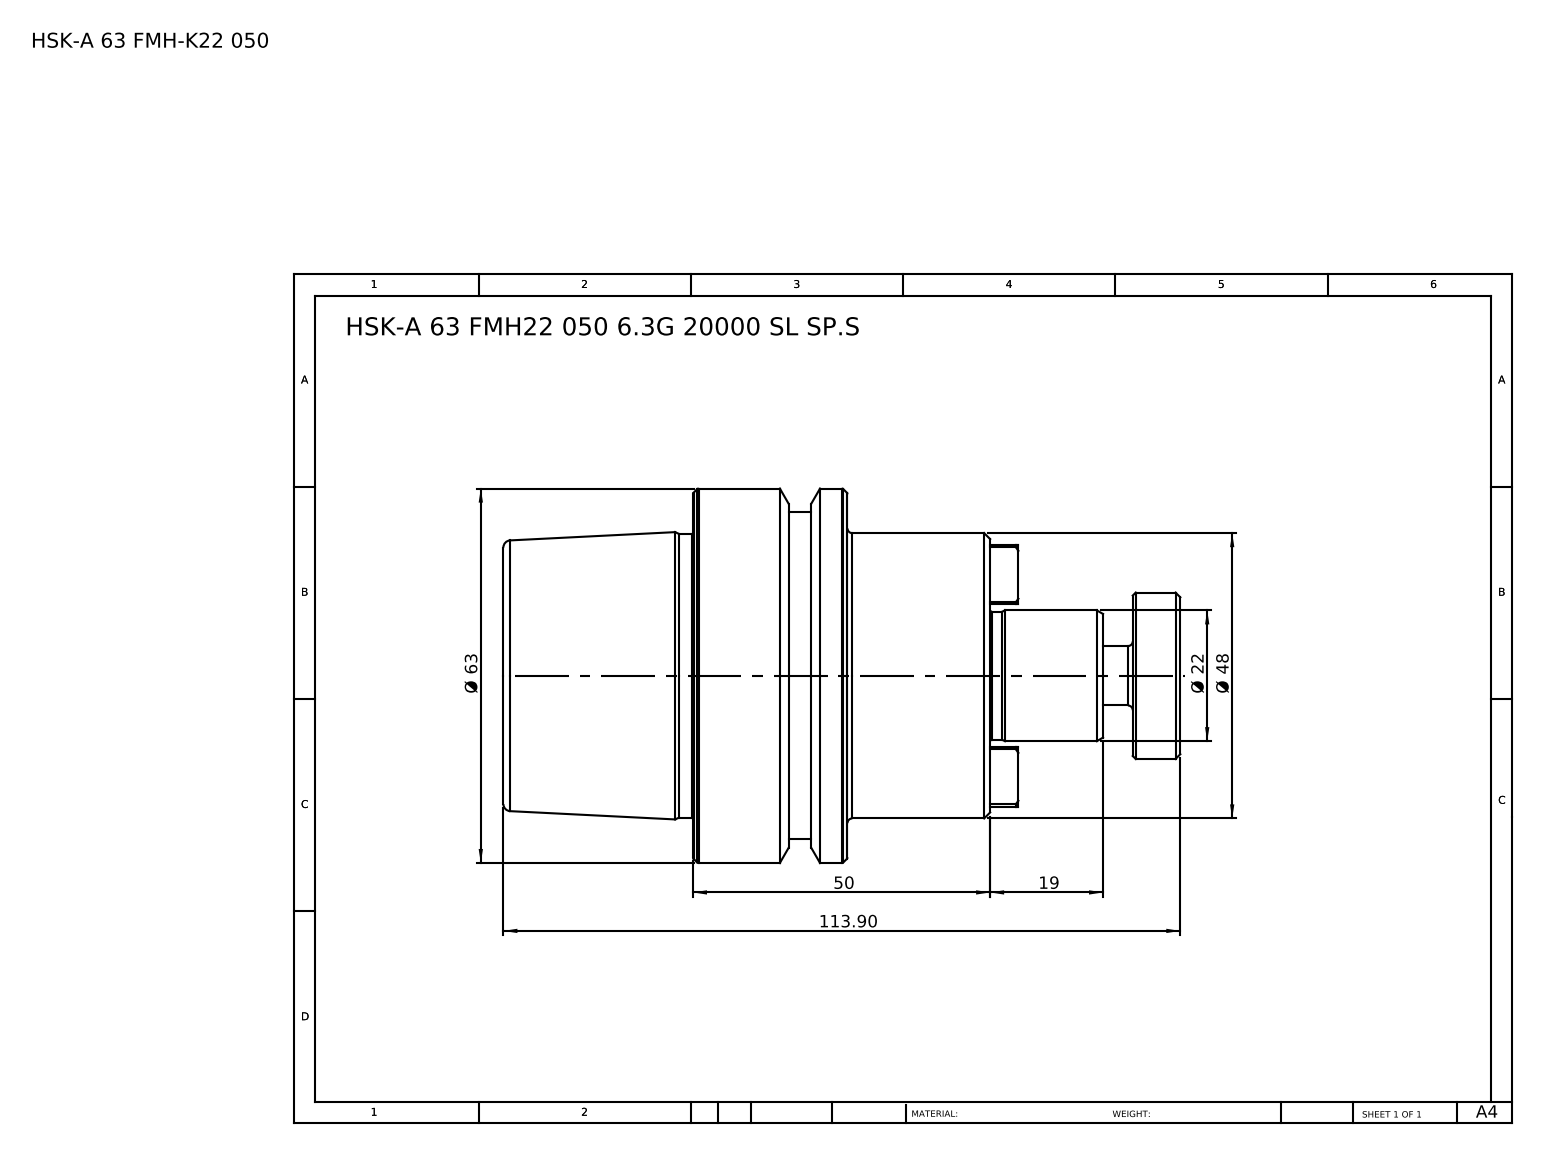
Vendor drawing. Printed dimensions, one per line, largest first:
113.90
Ø 63
50
Ø 48
Ø 22
19
